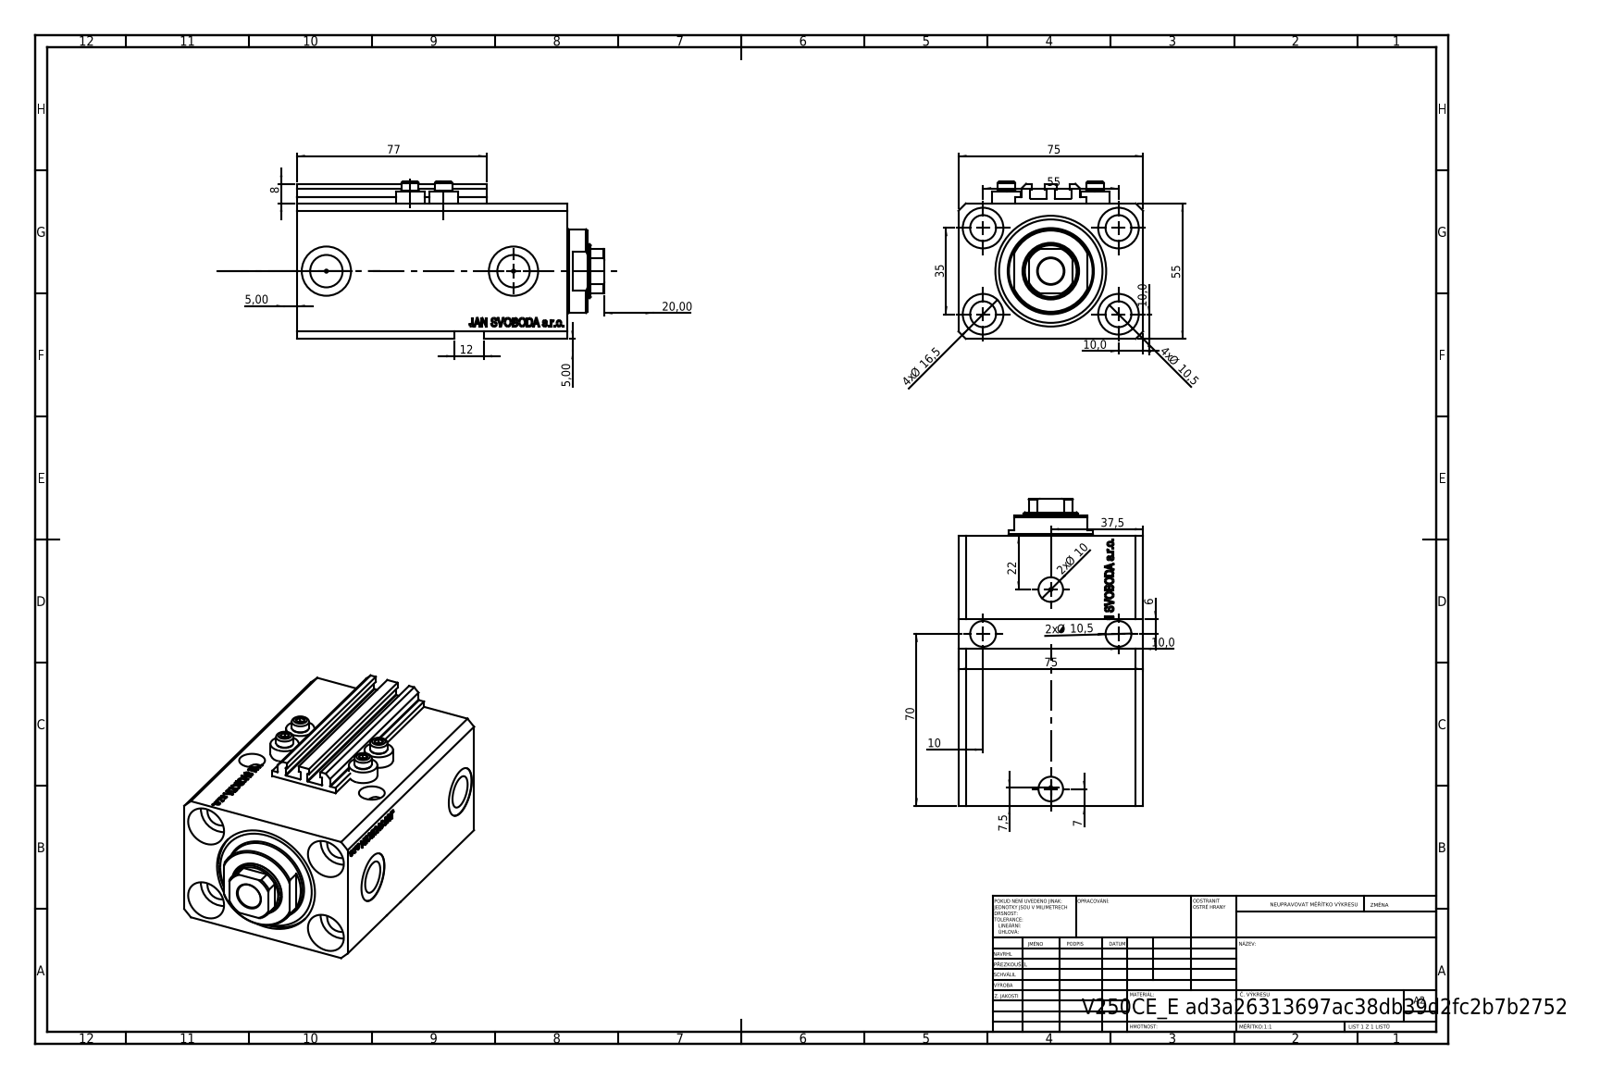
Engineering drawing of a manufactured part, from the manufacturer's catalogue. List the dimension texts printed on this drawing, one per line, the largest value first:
77
75
75
70
55
55
37,5
35
22
20,00
4x Ø 16,5
12
4x Ø 10,5
2x Ø 10,5
10,0
10,0
2x Ø 10
10,0
10
8
7,5
7
6
5,00
5,00
